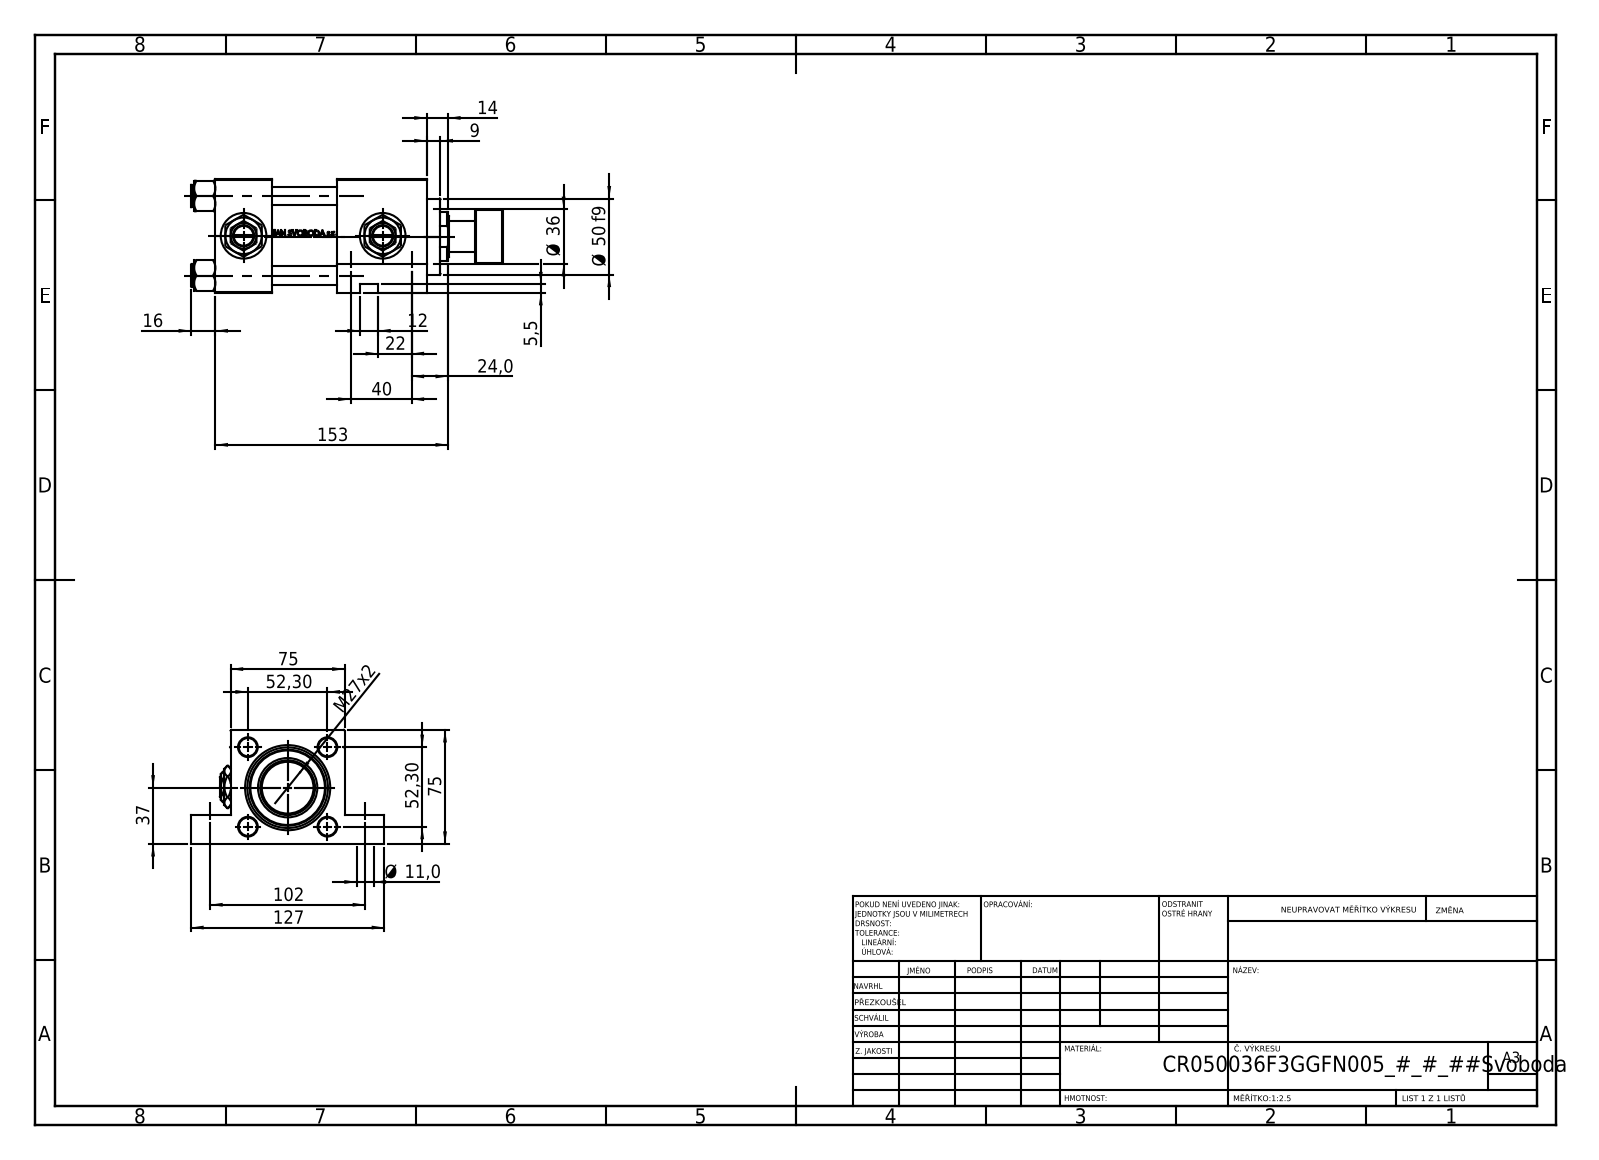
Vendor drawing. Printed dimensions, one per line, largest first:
153
127
102
75
75
52,30
52,30
Ø 50 f9
40
37
Ø 36
M27x2
24,0
22
16
14
12
Ø 11,0
9
5,5
